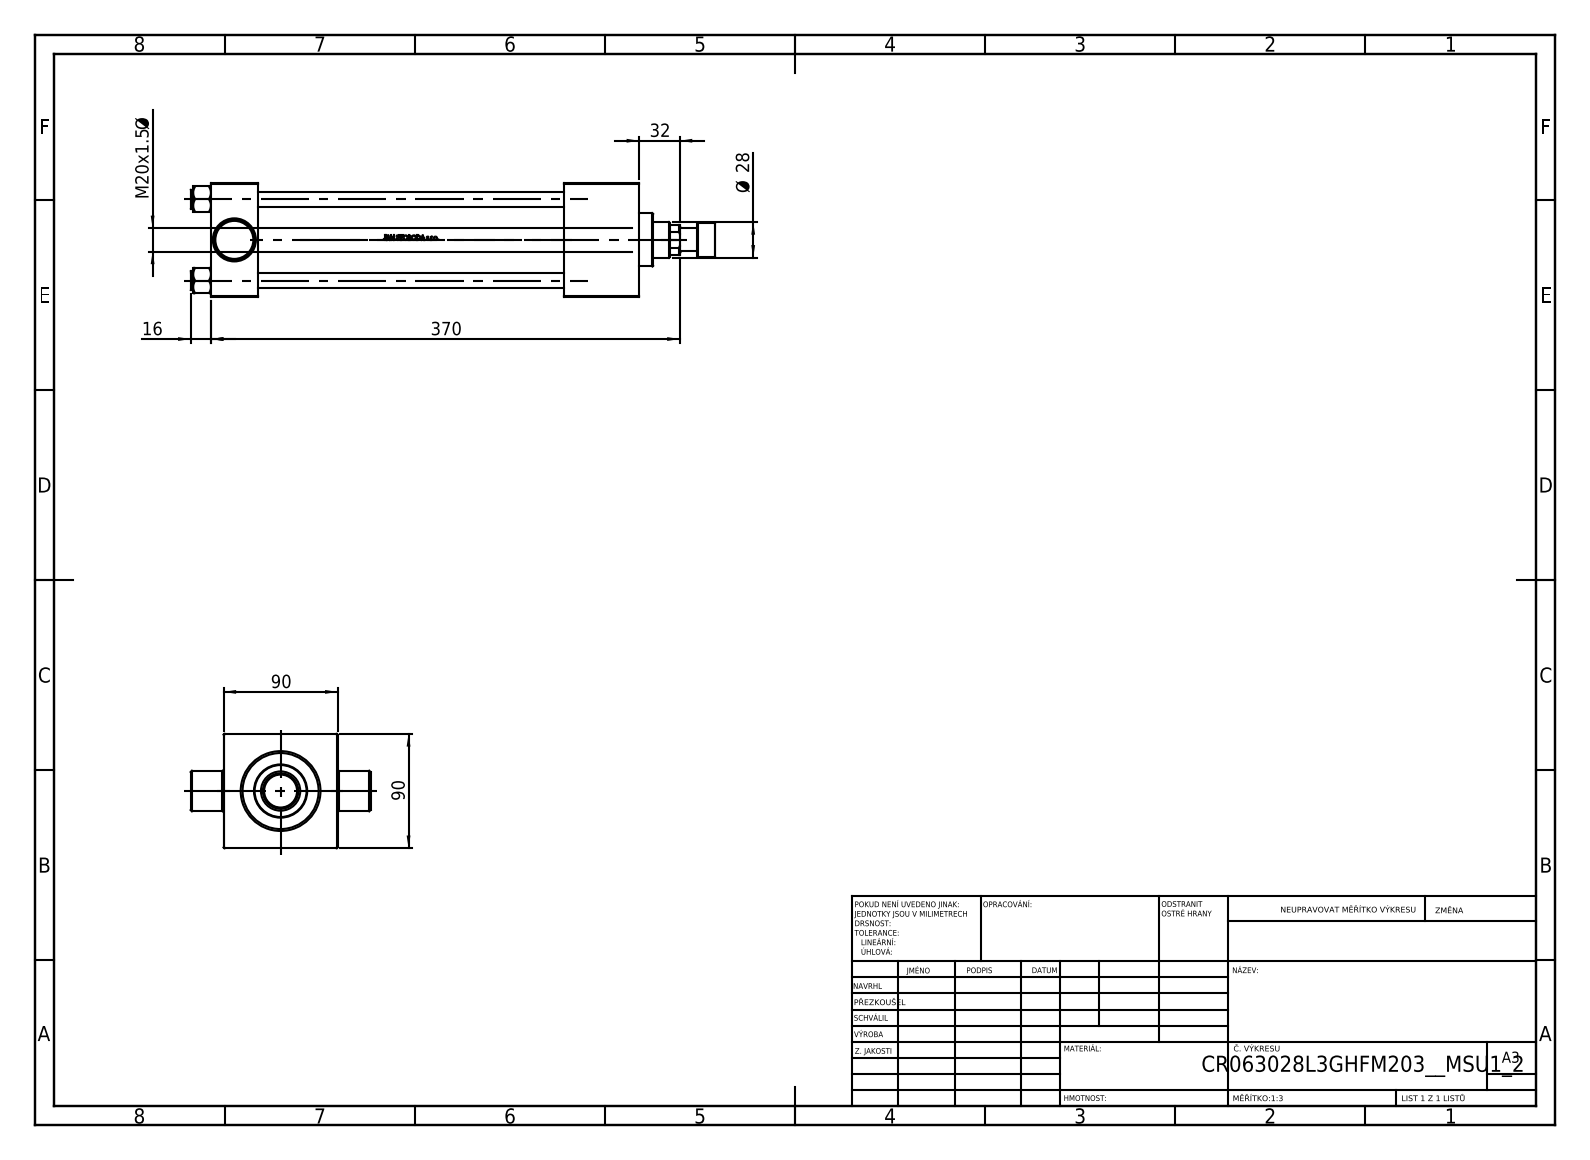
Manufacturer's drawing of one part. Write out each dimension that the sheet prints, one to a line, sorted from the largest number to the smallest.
370
90
90
32
Ø 28
M20x1.5 Ø
16
